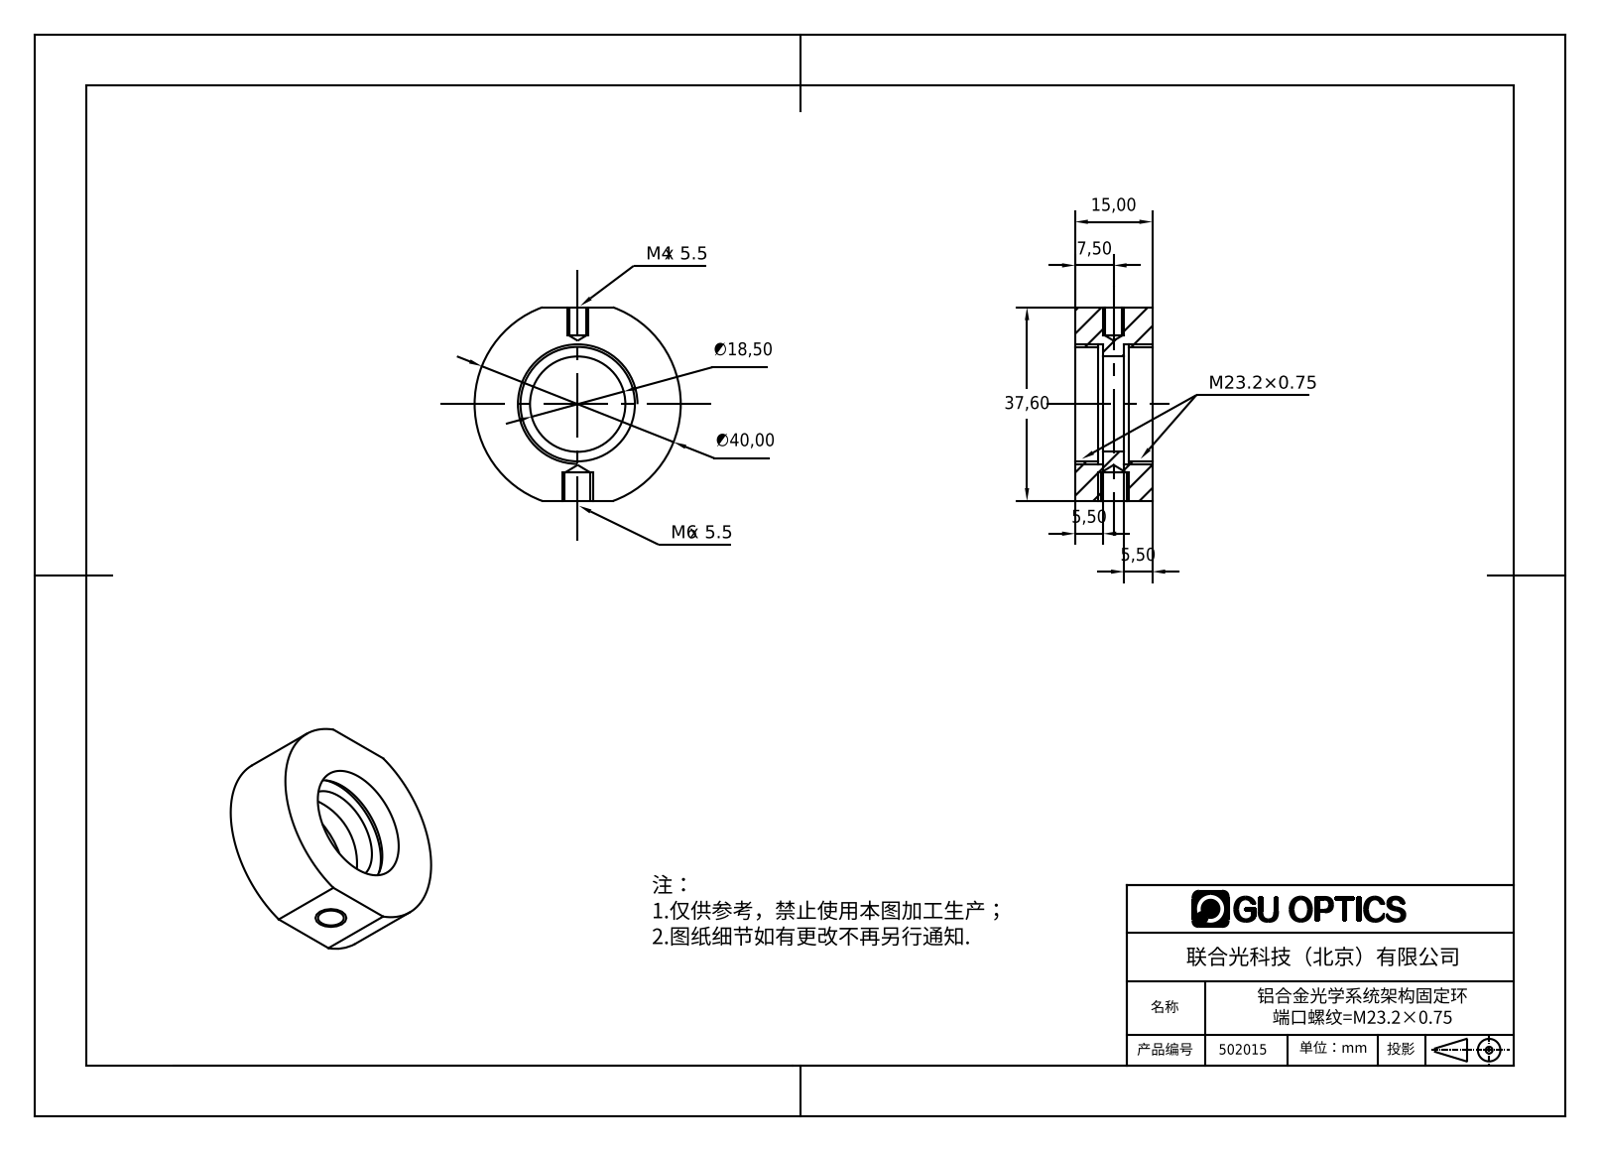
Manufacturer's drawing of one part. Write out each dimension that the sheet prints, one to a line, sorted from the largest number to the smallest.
∅40,00
37,60
∅18,50
15,00
7,50
5,50
5,50
